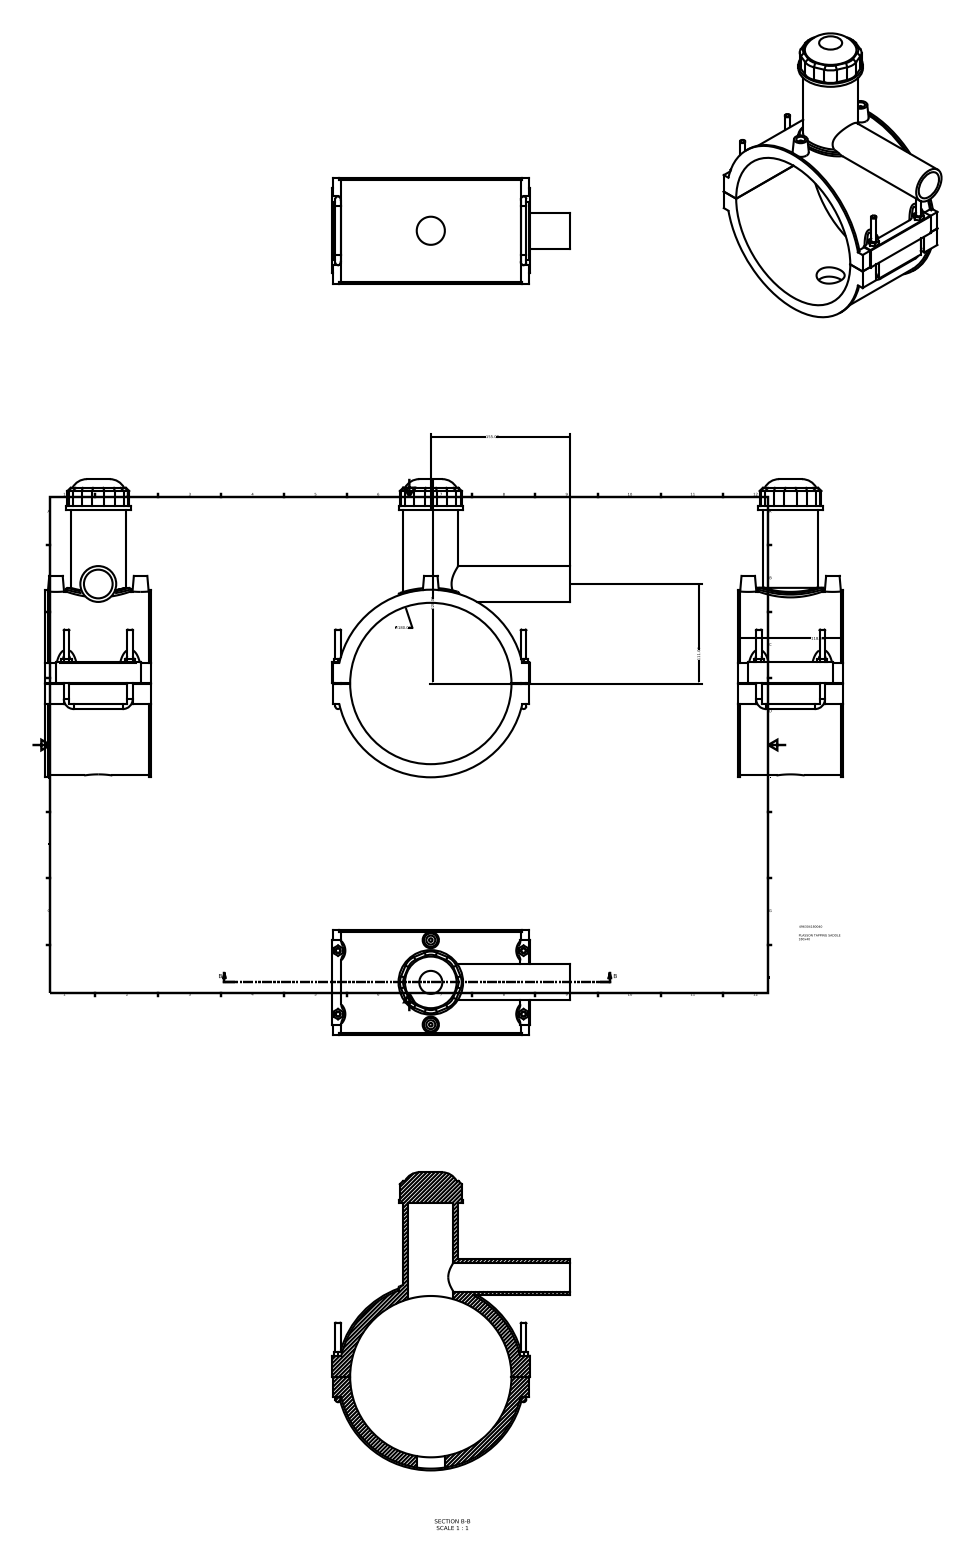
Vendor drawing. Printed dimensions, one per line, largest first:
228.00
∅180.00
155.00
118.00
111.00
